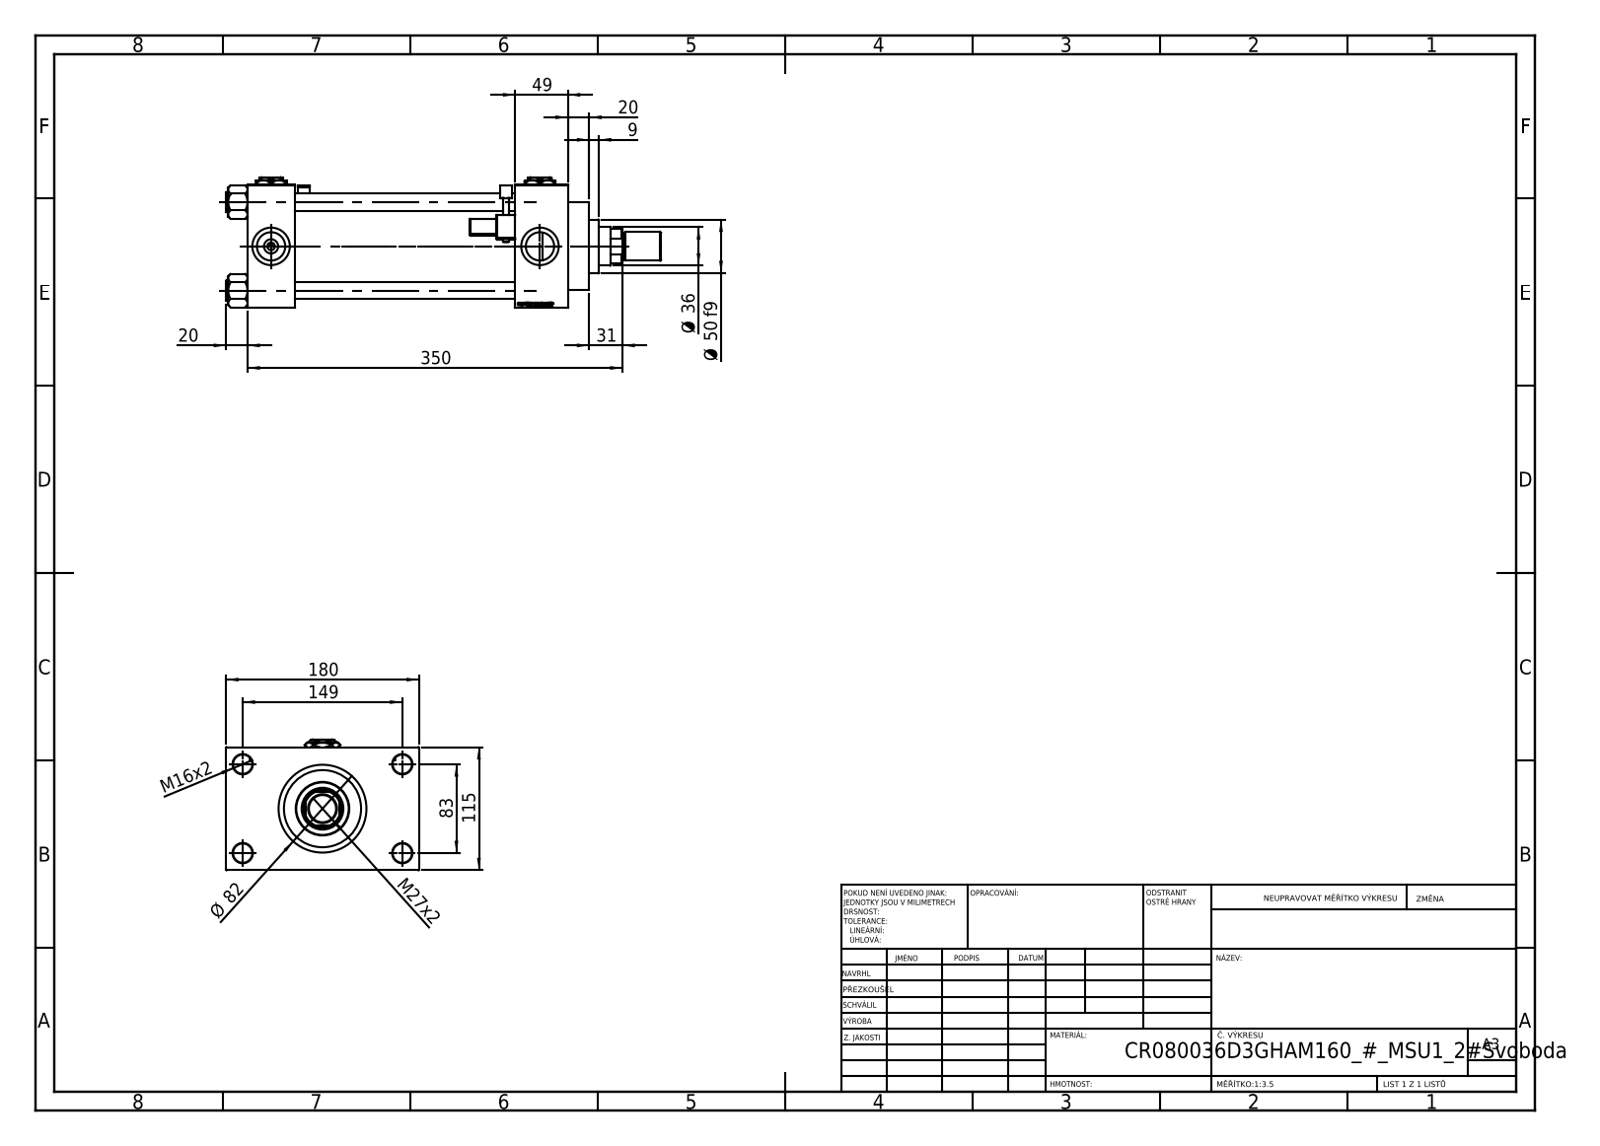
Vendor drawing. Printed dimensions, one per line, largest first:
350
180
149
115
83
Ø 82
Ø 50 f9
49
Ø 36
31
M27x2
20
20
M16x2
9
